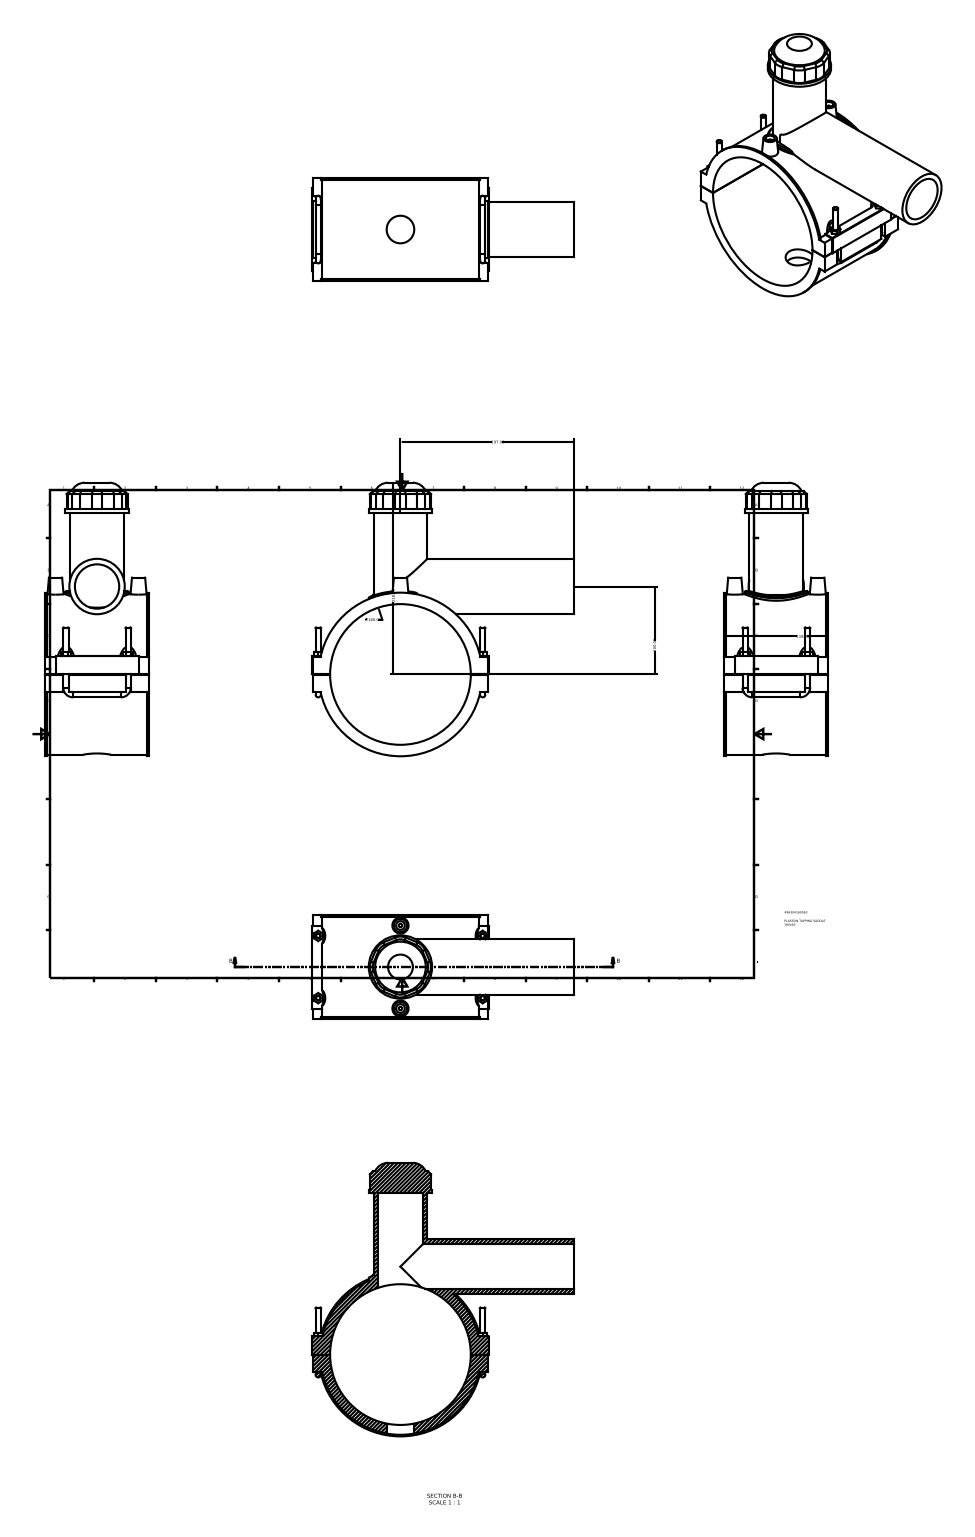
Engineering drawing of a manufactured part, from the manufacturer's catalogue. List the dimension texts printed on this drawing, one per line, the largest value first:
218.00
197.00
∅160.00
118.00
100.00
